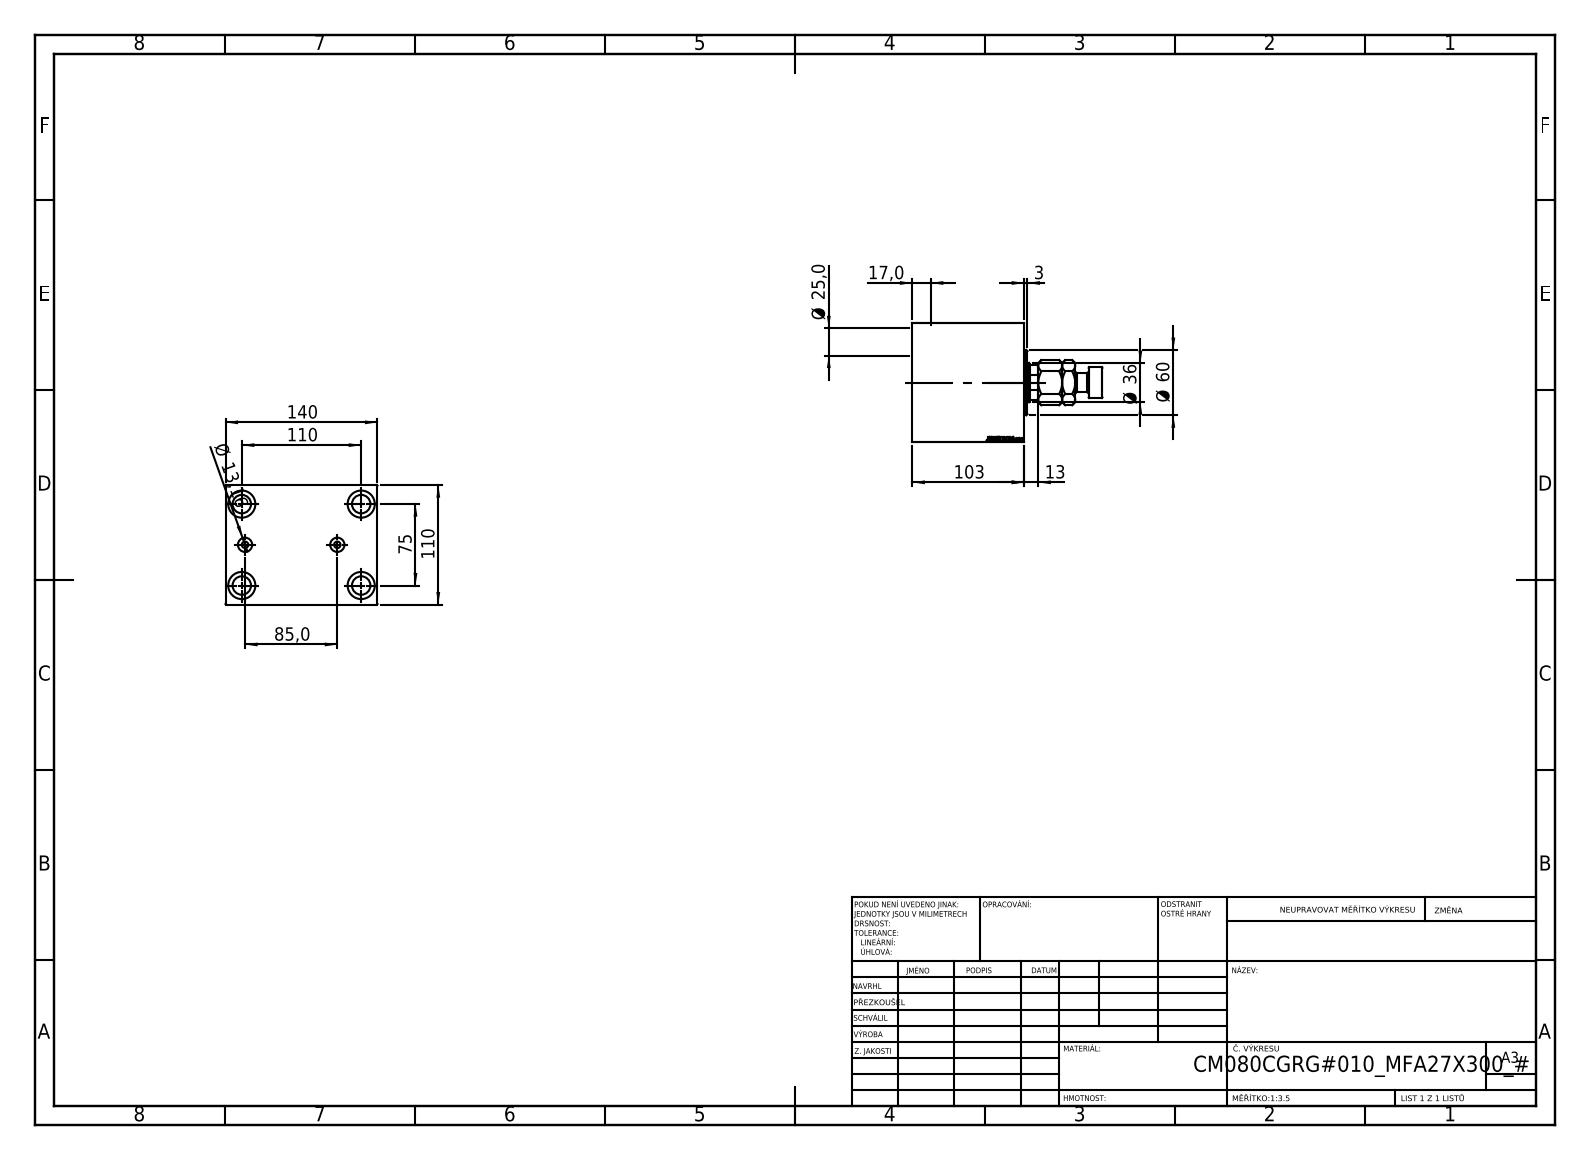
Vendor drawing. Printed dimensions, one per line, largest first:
140
110
110
103
85,0
75
Ø 60
Ø 36
Ø 25,0
17,0
Ø 13,16
13
3
